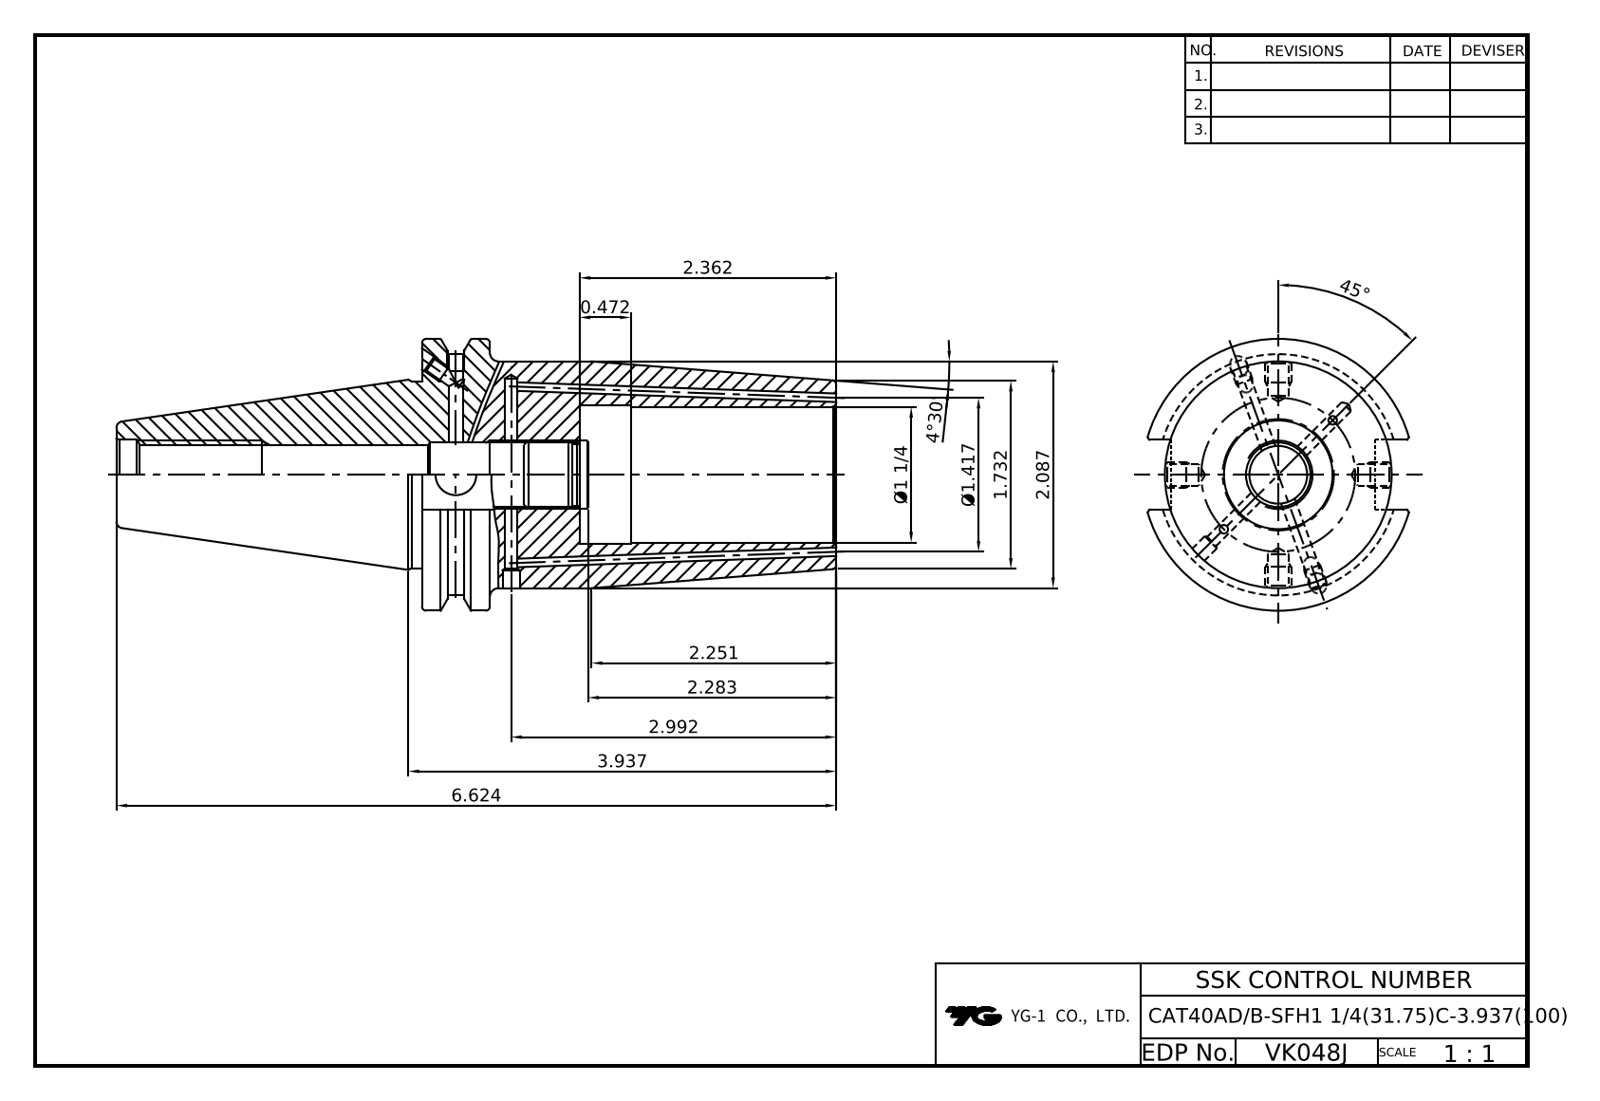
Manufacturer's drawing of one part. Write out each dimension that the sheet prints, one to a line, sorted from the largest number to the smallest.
45°
6.624
4°30'
3.937
2.992
2.362
2.283
2.251
2.087
1.732
Ø1.417
Ø1 1/4
0.472
